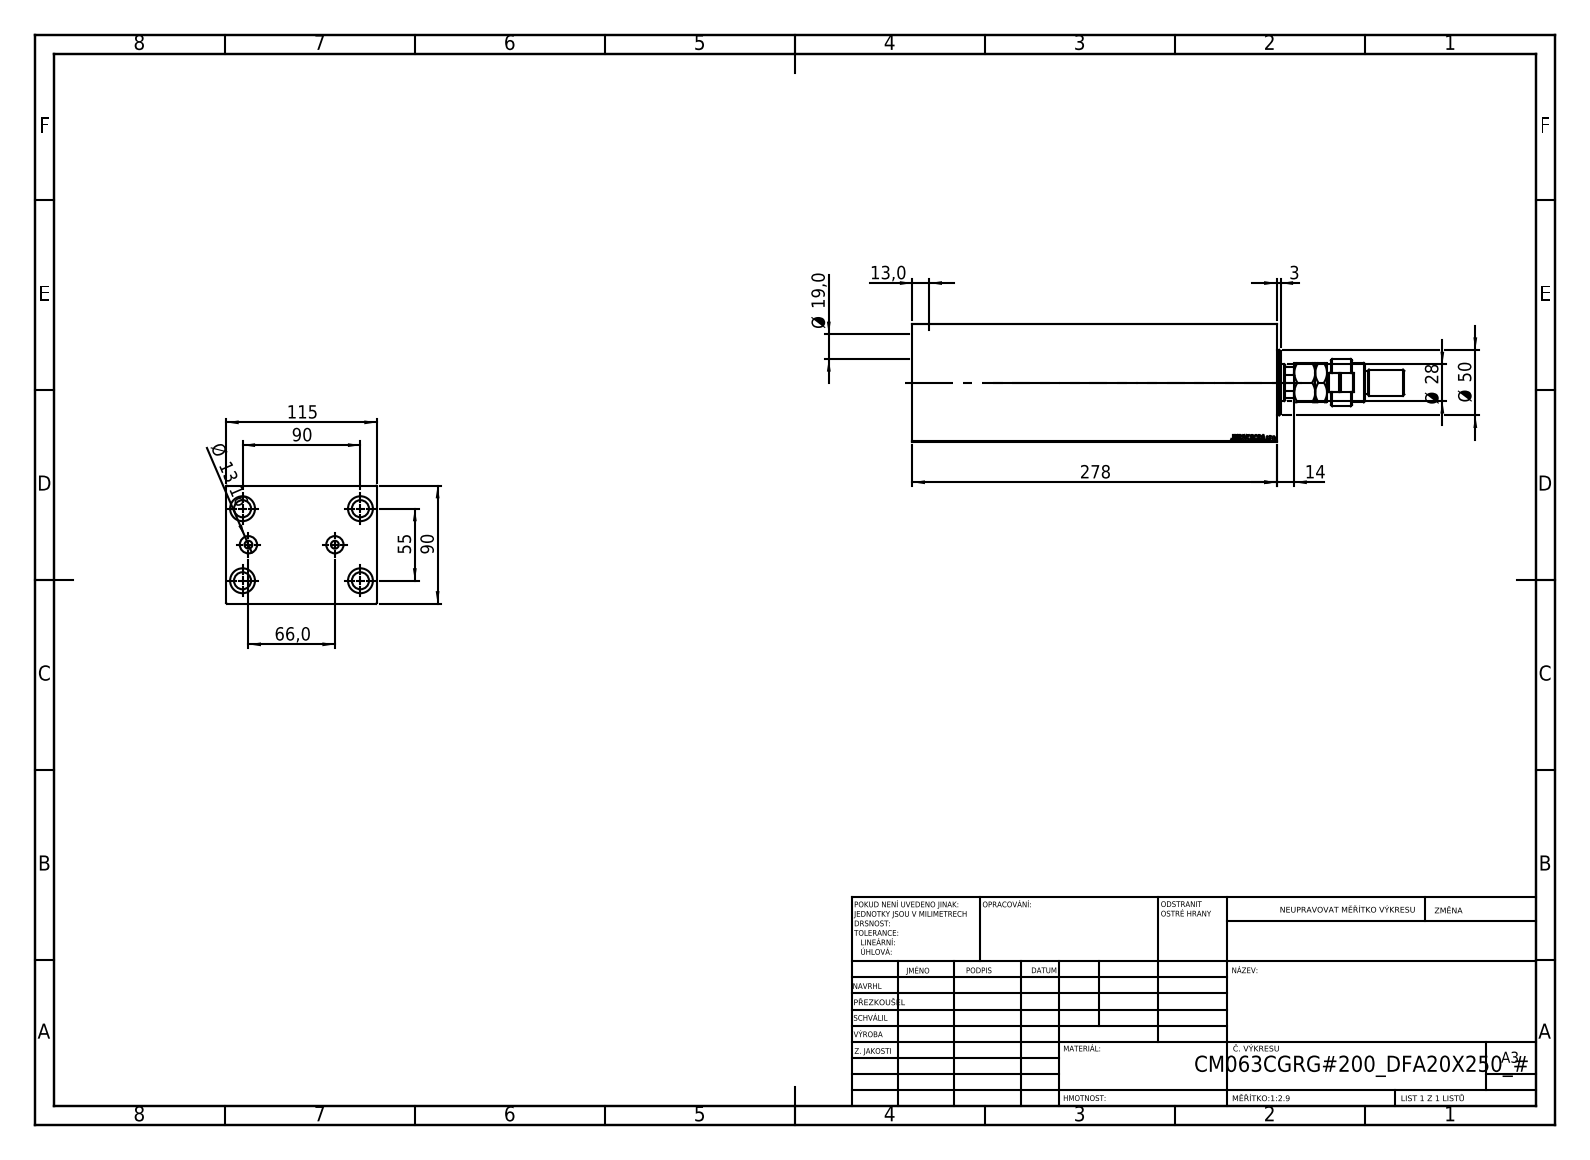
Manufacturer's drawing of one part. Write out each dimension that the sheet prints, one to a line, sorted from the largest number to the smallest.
278
115
90
90
66,0
55
Ø 50
Ø 28
Ø 19,0
14
Ø 13,16
13,0
3
